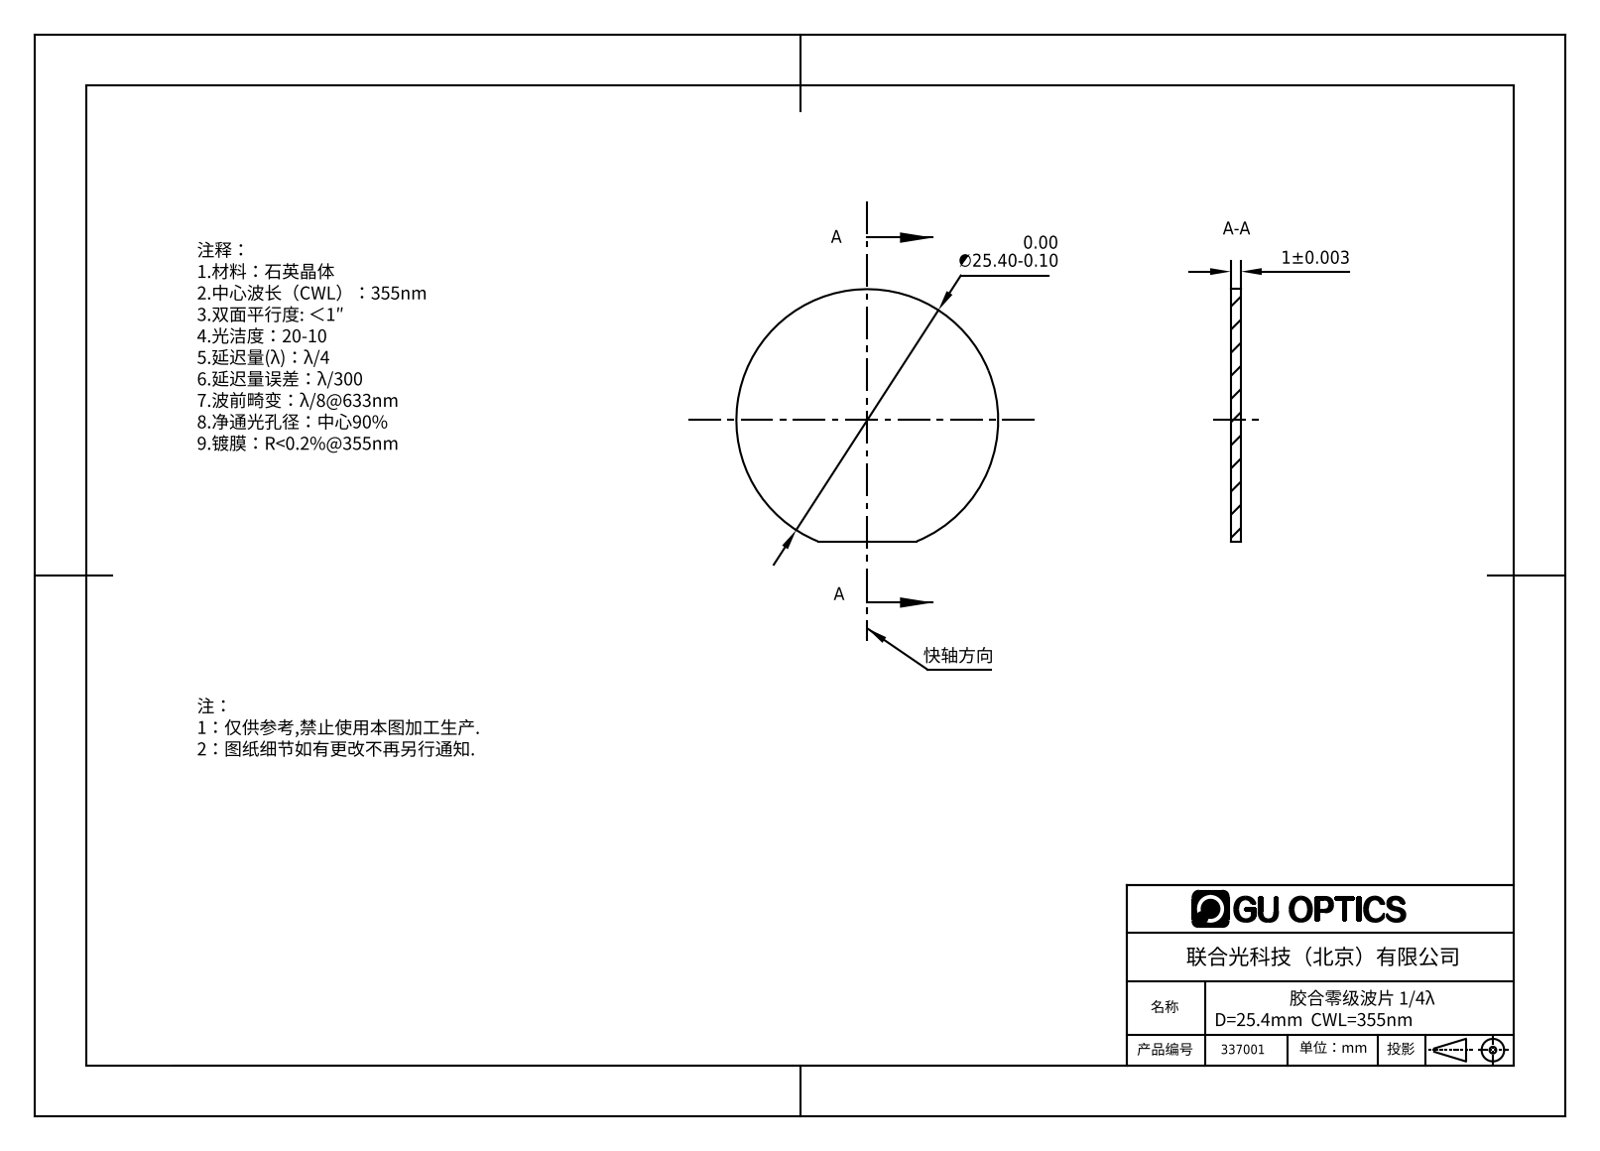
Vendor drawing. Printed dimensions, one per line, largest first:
12.70
1±0.003
